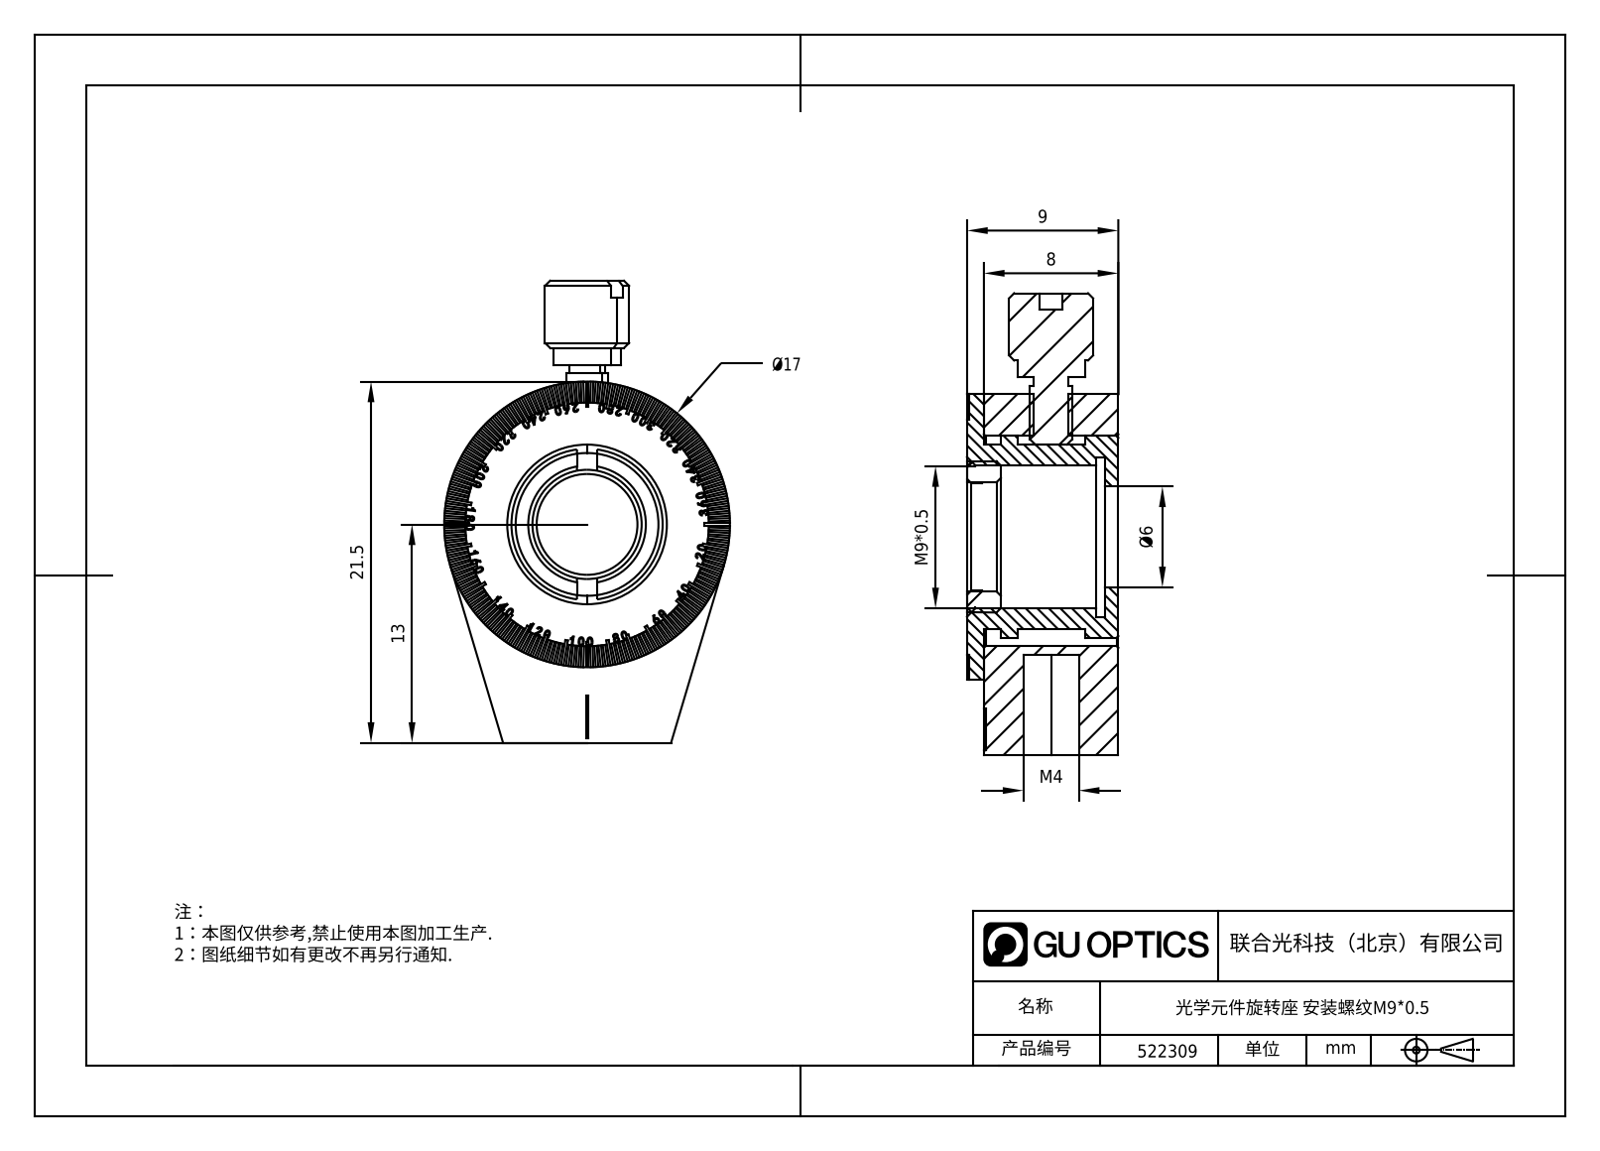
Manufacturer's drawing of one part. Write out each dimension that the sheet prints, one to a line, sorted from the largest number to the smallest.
21.5
13
M9*0.5
9
8
Ø6
M4
